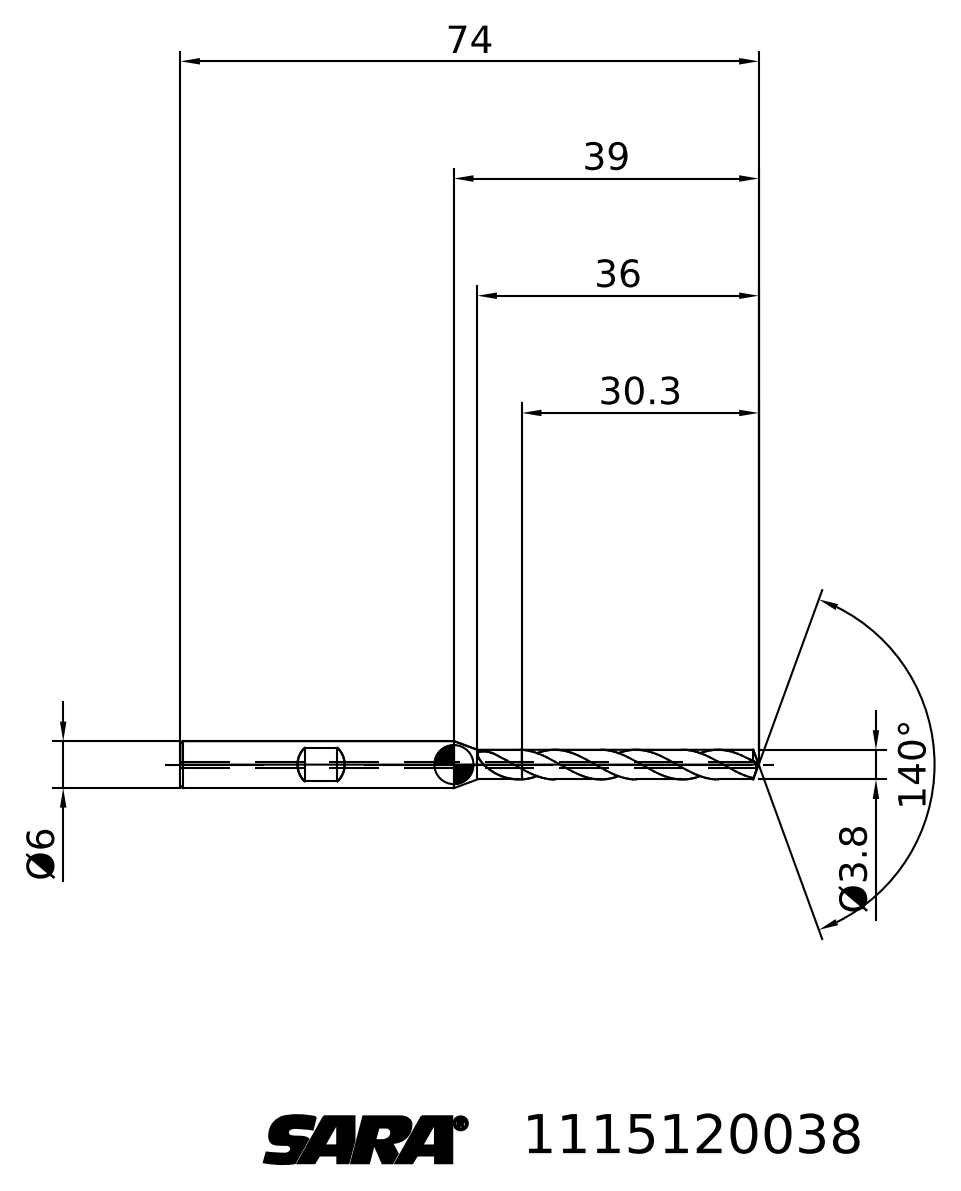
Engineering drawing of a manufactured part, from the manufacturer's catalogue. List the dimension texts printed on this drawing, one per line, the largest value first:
140°
74
39
36
30.3
Ø6
Ø3.8
